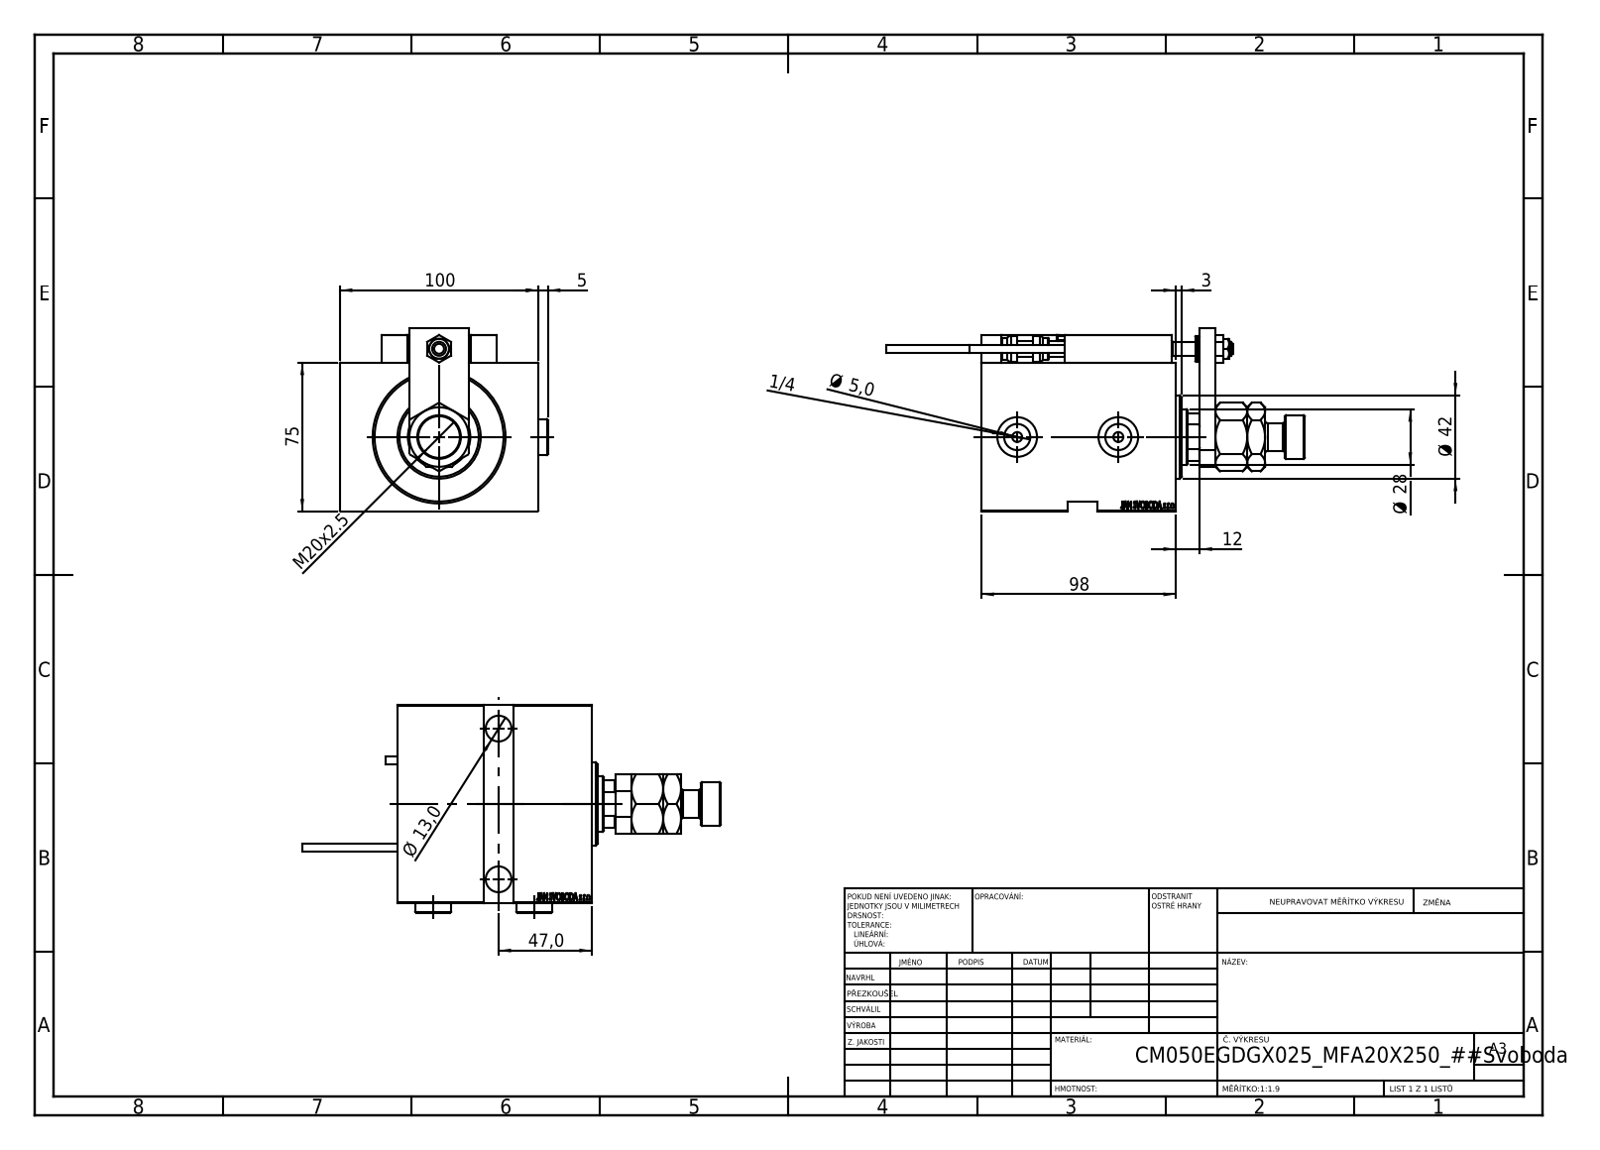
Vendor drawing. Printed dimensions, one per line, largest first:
100
98
75
47,0
Ø 42
Ø 28
M20x2.5
Ø 13,0
12
5
Ø 5,0
3
1/4
